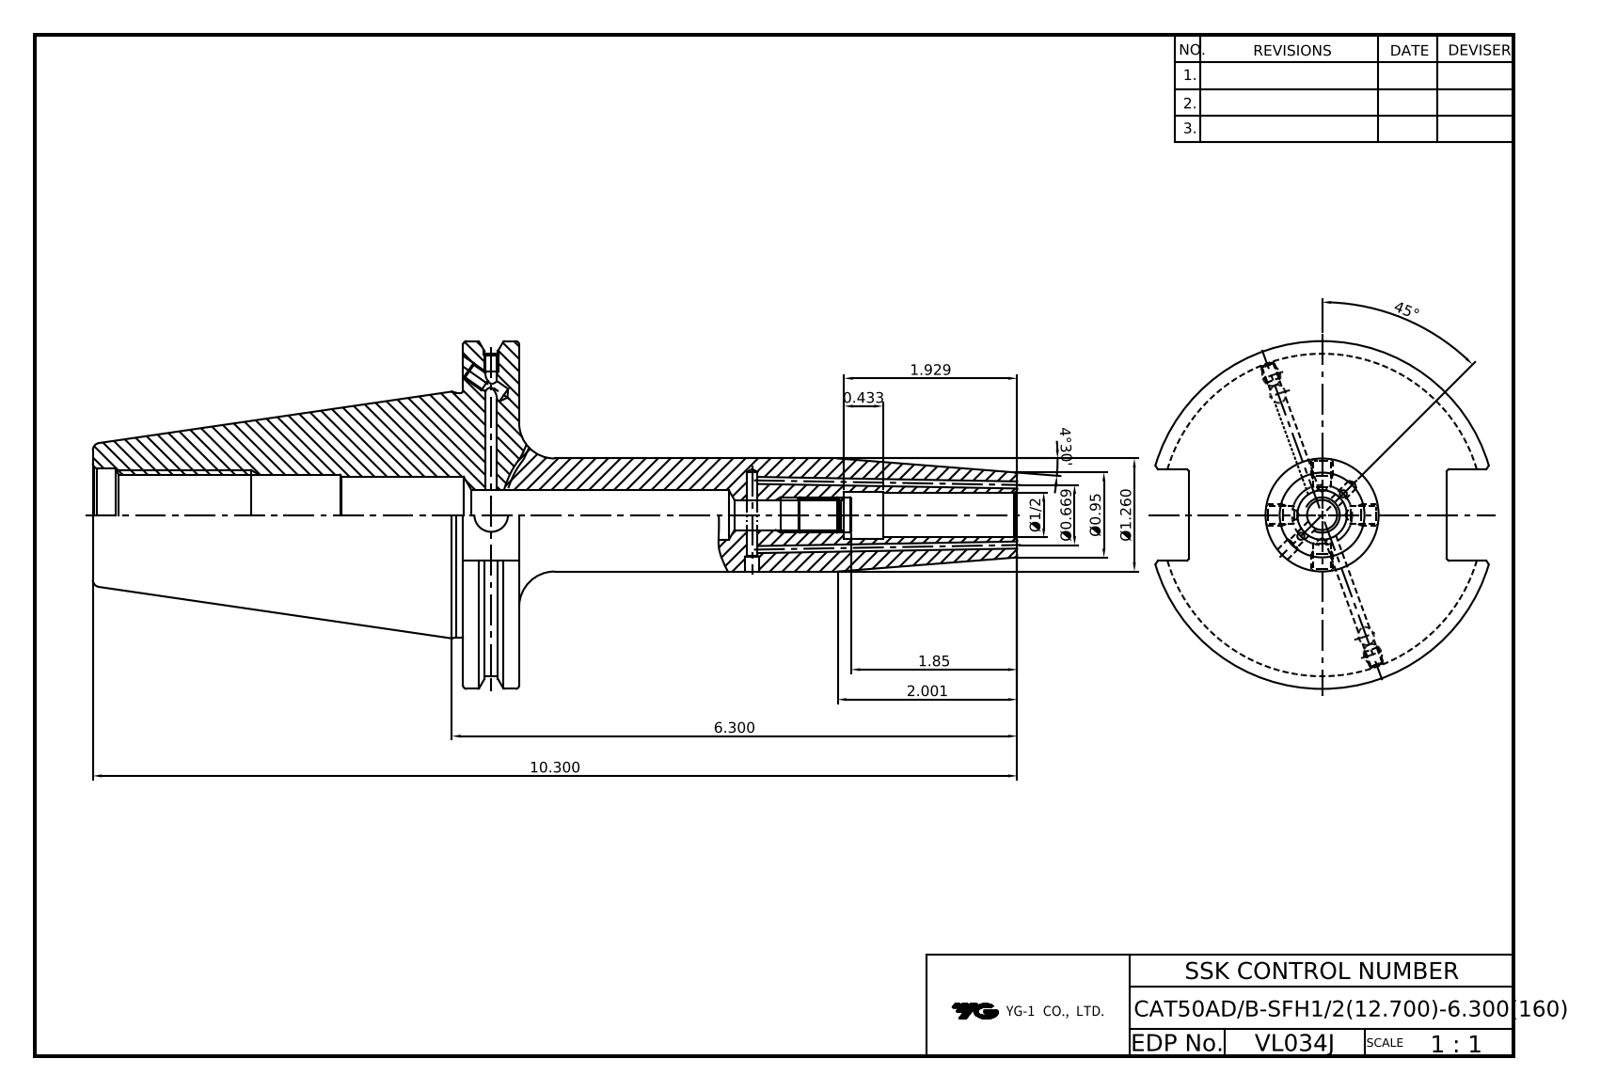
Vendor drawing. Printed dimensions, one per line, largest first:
45°
10.300
6.300
4°30'
2.001
1.929
1.85
Ø1.260
Ø0.95
Ø0.669
Ø1/2
0.433
